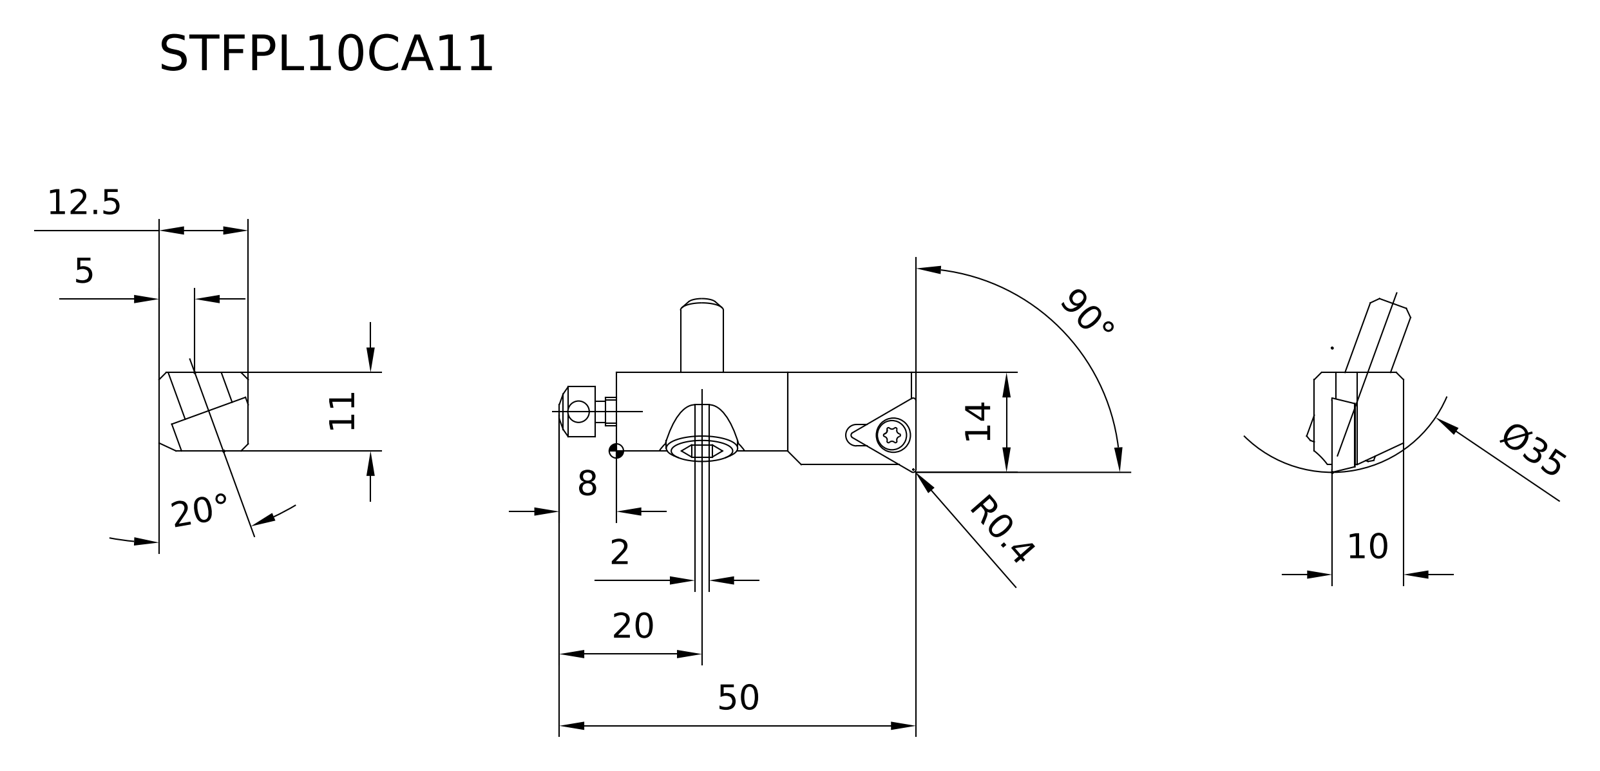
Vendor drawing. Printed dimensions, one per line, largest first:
90°
50
Ø35
20
20°
14
12.5
11
10
8
5
2
R0.4
